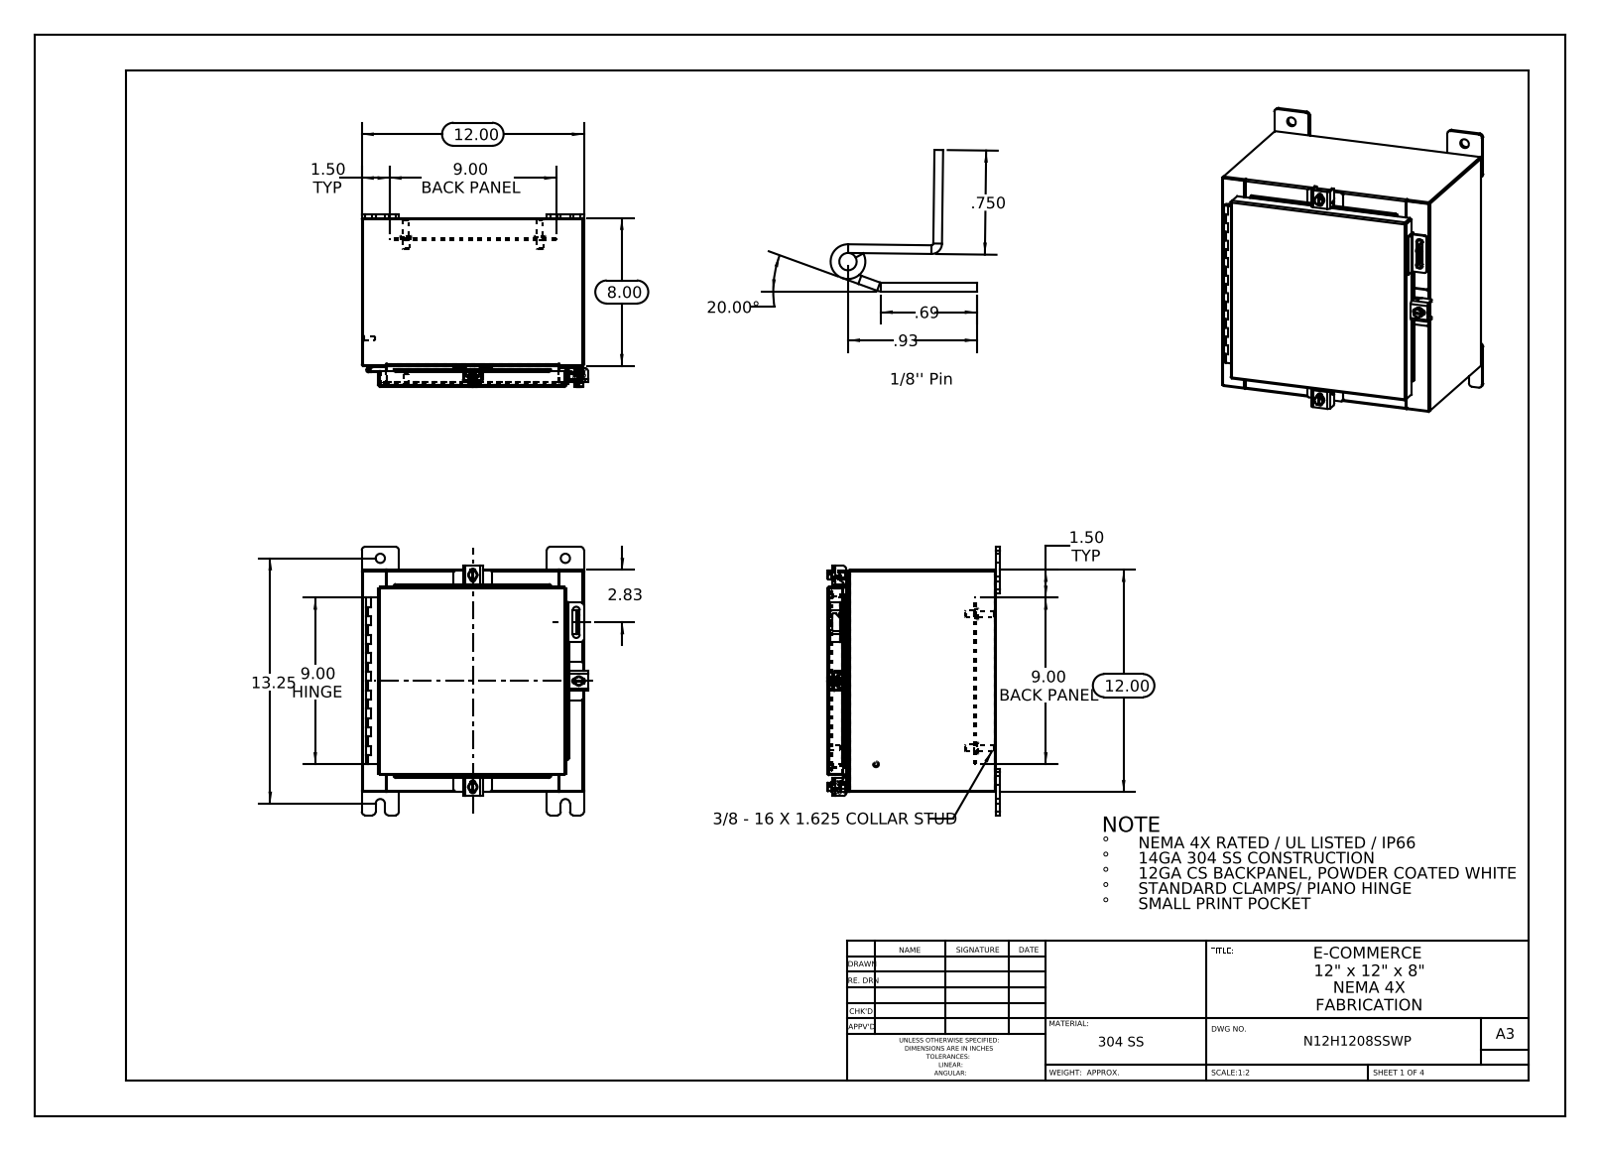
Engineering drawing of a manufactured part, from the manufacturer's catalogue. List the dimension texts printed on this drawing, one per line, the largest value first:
20.00°
13.25
12.00
12.00
9.00 HINGE
9.00 BACK PANEL
9.00 BACK PANEL
8.00
2.83
1.50 TYP
1.50 TYP
.93
.750
.69
